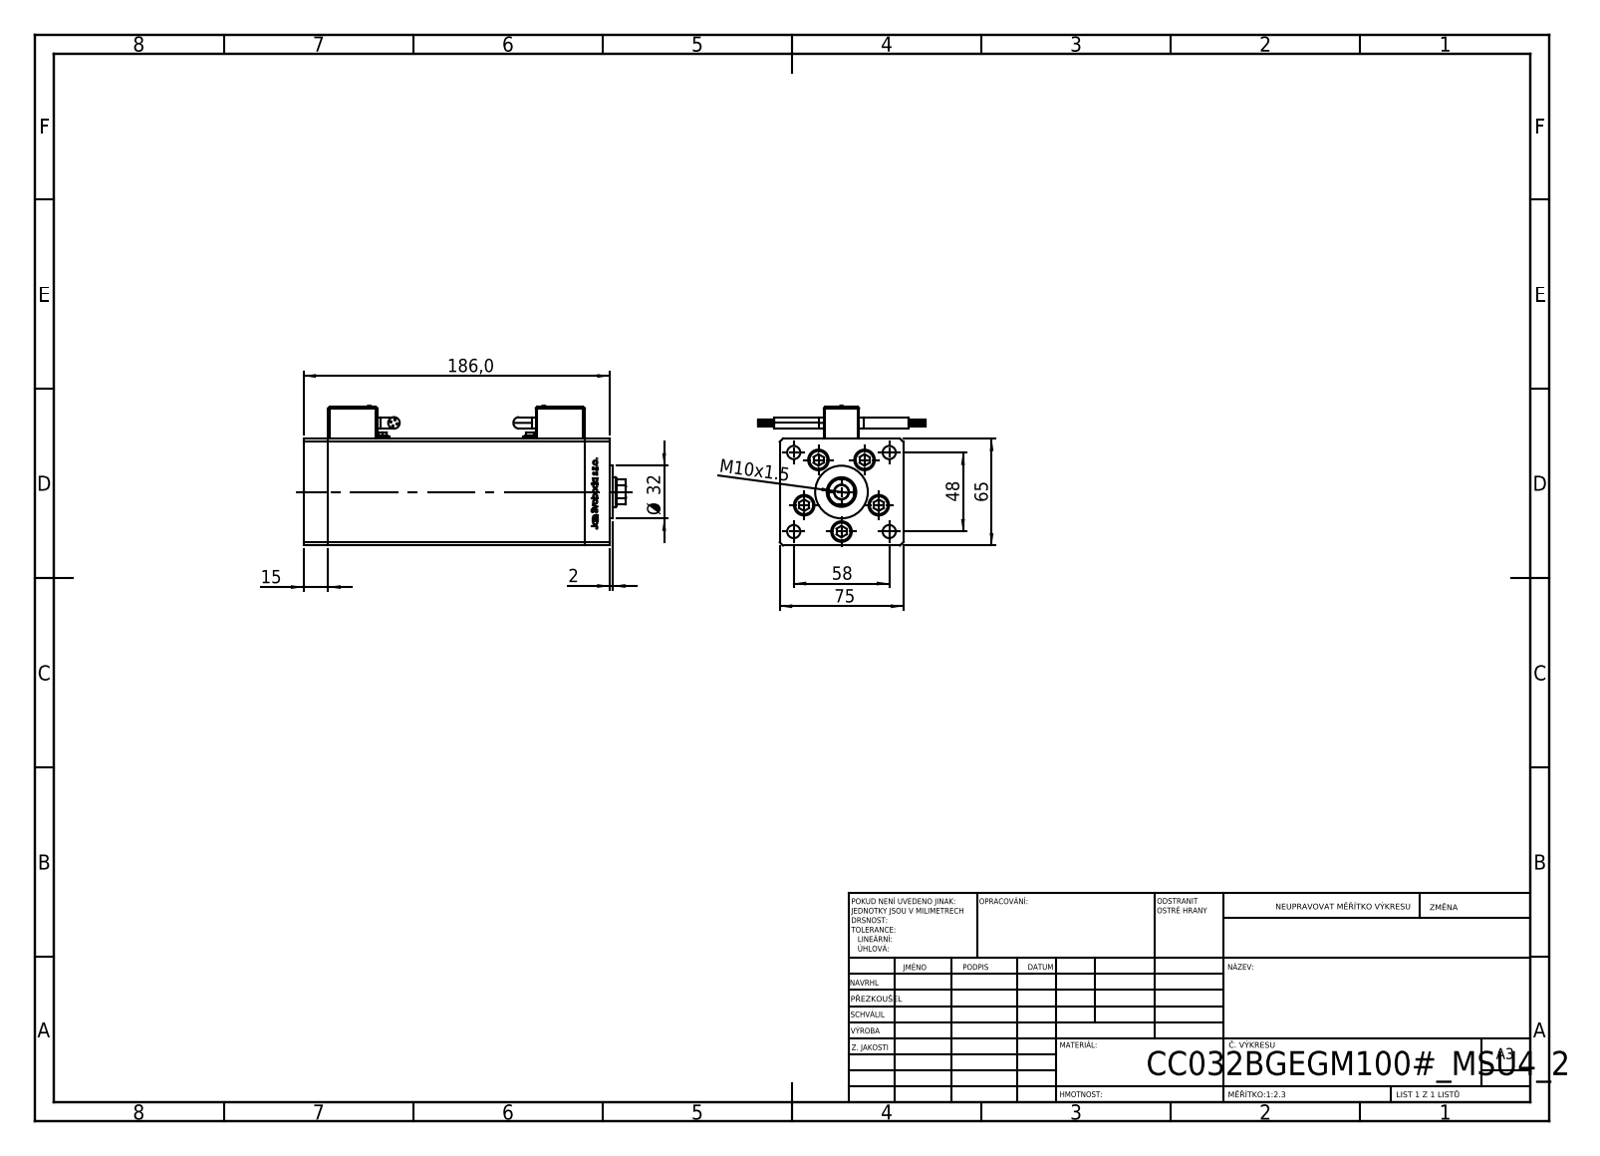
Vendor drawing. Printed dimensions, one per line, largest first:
186,0
75
65
58
48
Ø 32
15
M10x1.5
2
